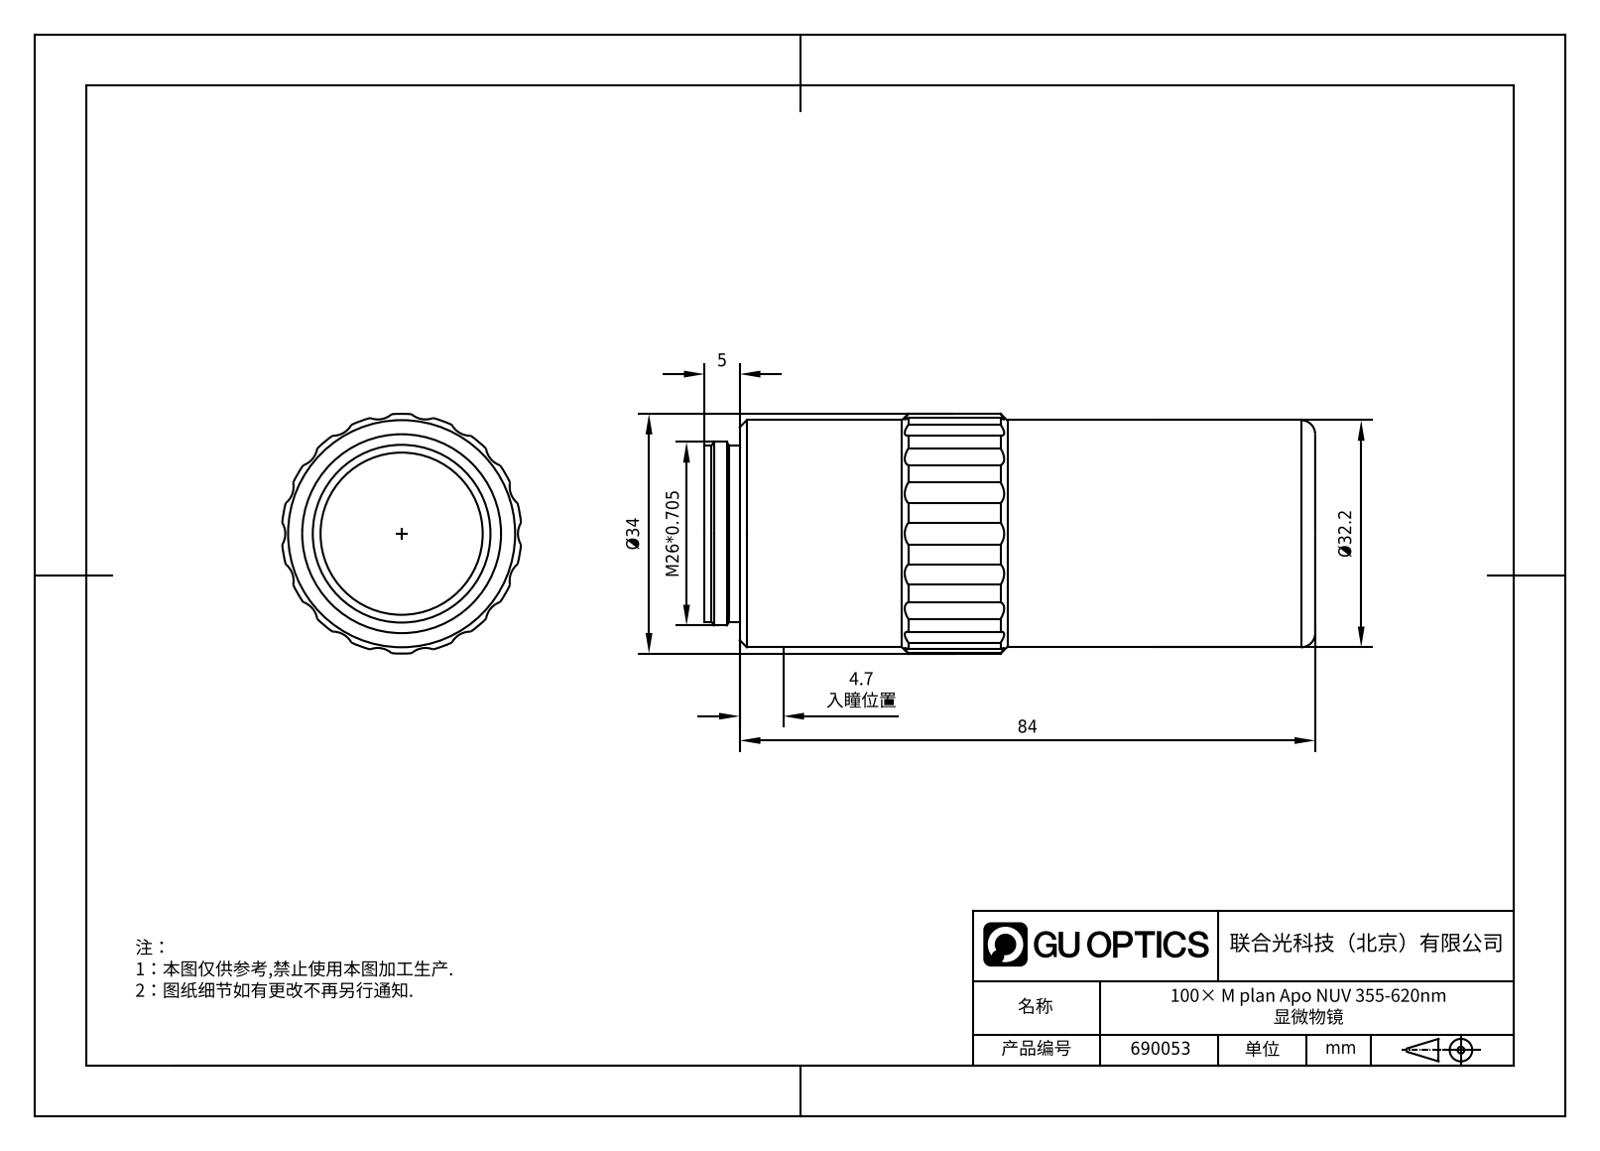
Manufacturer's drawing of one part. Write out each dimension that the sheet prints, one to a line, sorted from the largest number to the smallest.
84
Ø34
Ø32.2
M26*0.705
5
4.7 入瞳位置
